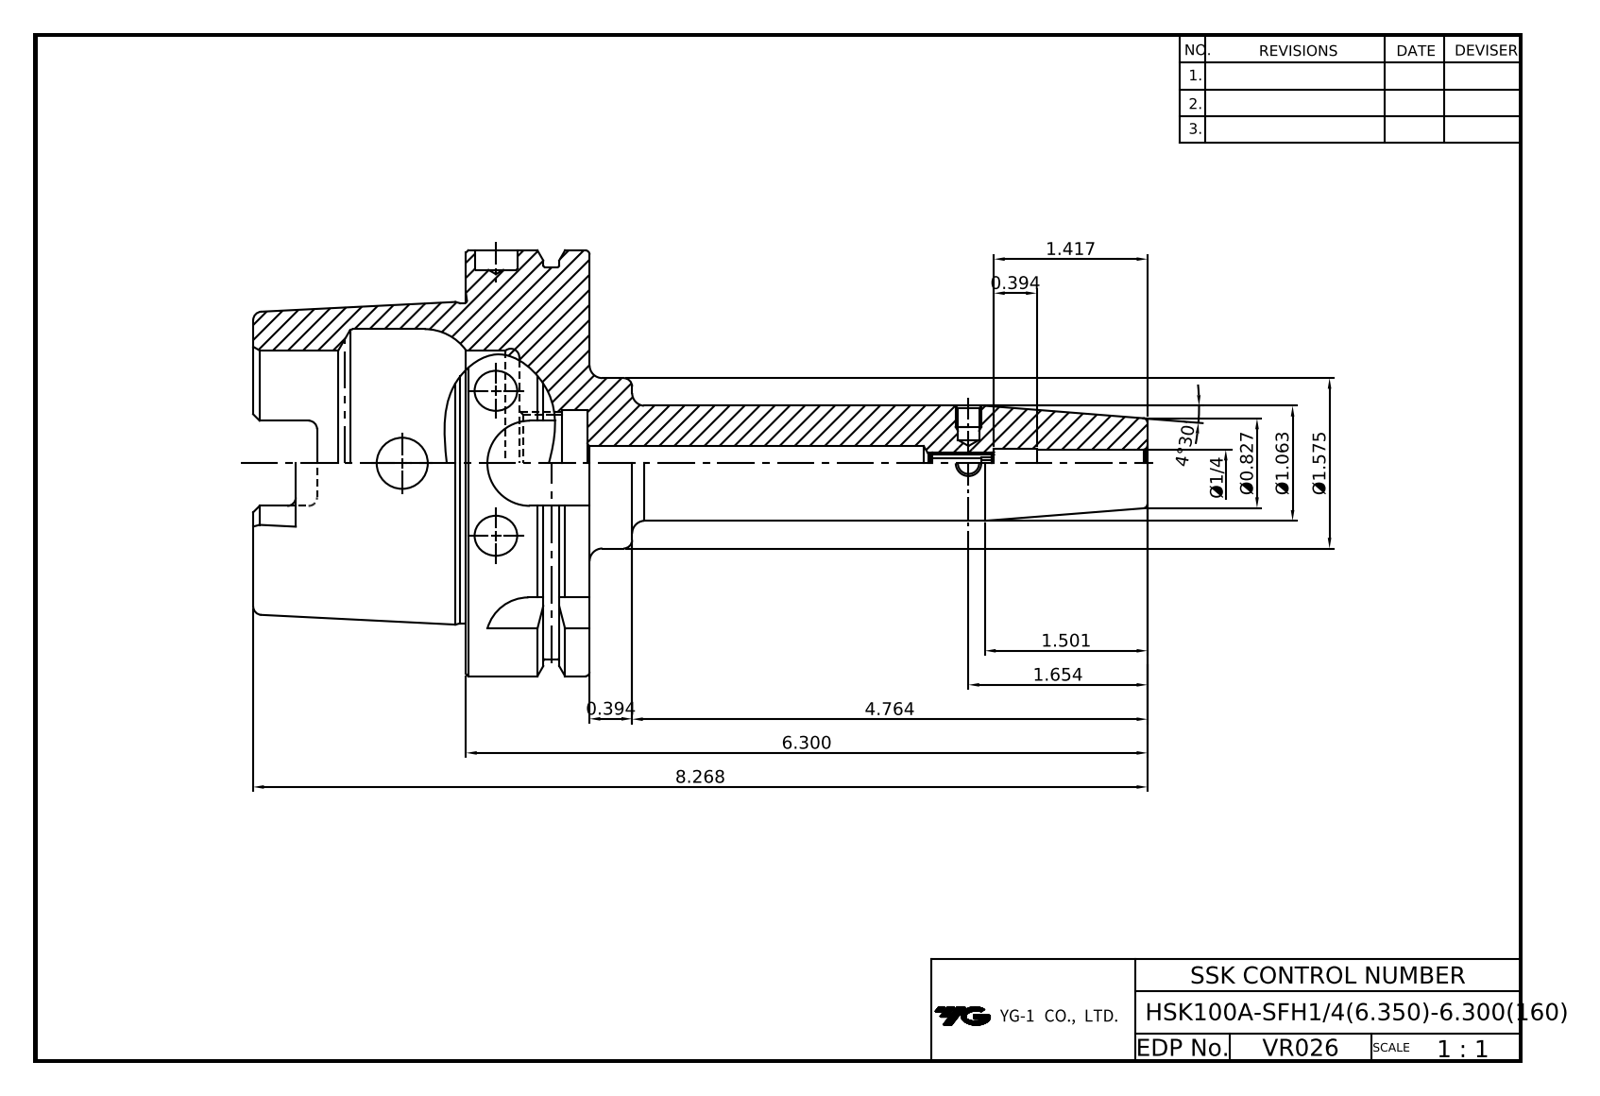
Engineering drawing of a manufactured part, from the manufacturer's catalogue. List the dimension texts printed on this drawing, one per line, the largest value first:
8.268
6.300
4.764
4°30'
1.654
Ø1.575
1.501
1.417
Ø1.063
Ø0.827
0.394
0.394
